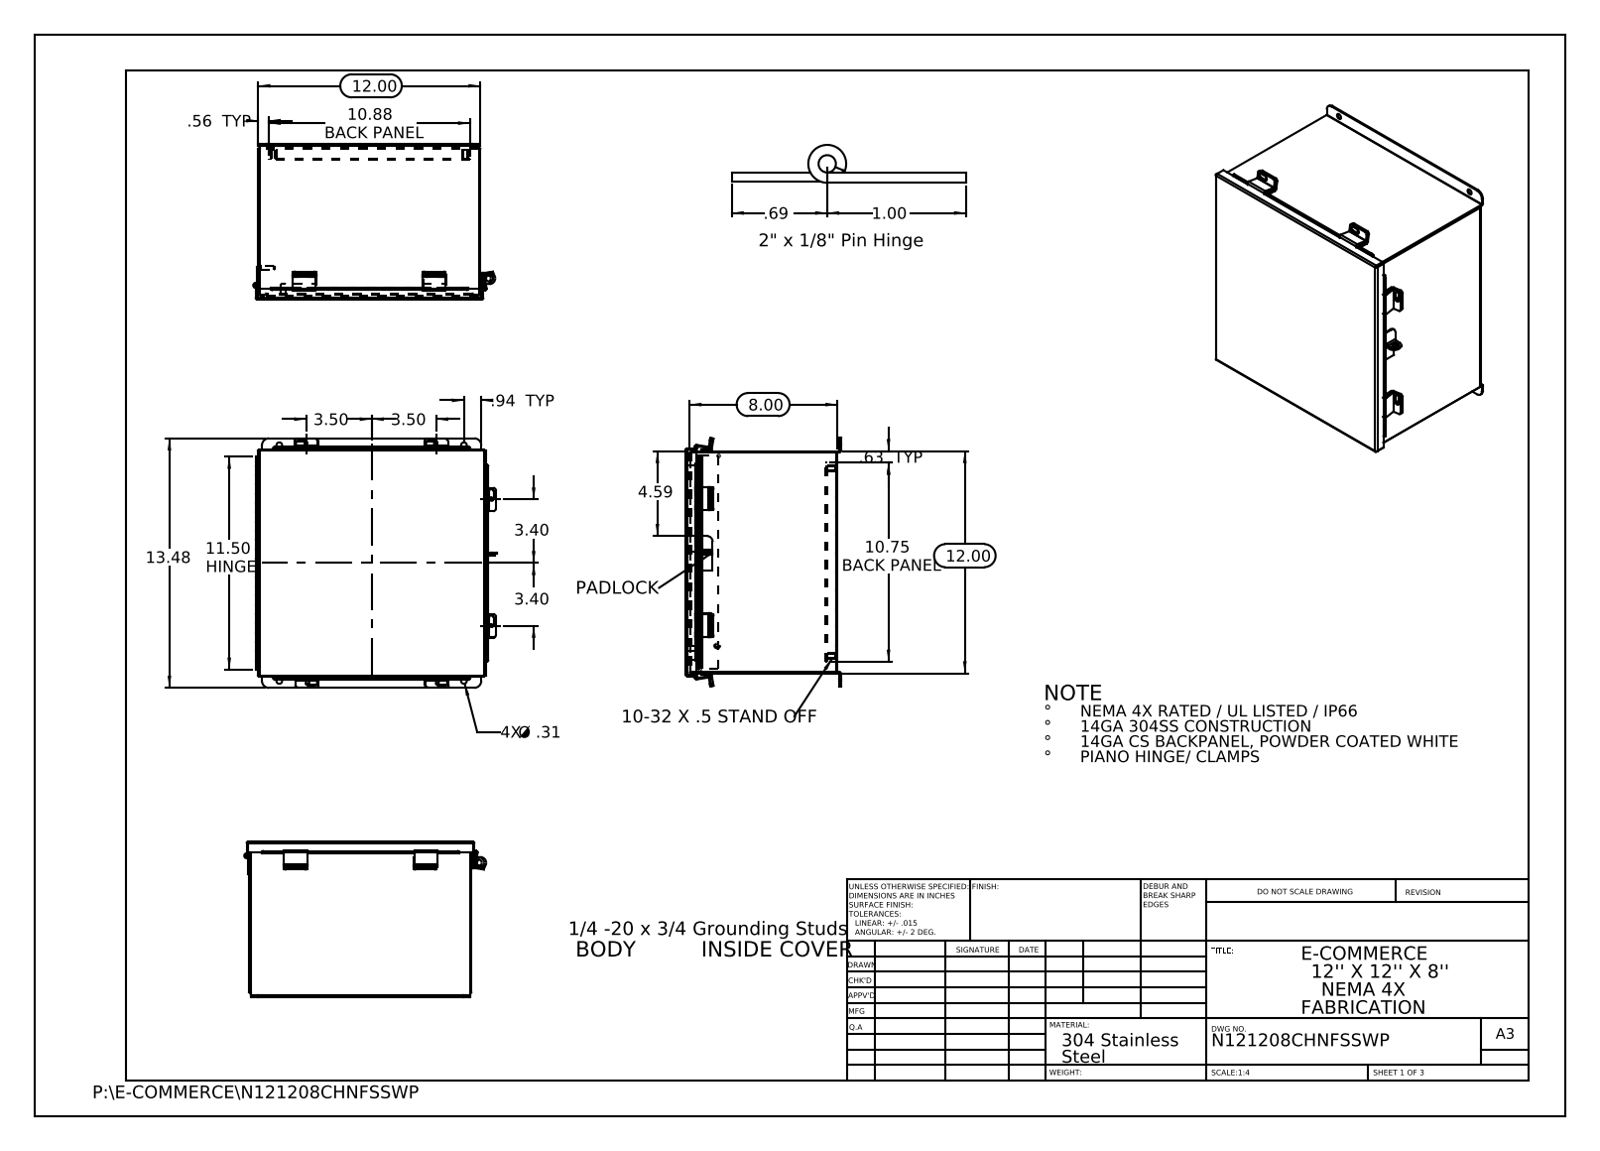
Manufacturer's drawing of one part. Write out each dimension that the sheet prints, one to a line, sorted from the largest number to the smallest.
13.48
12.00
12.00
11.50 HINGE
10.88 BACK PANEL
10.75 BACK PANEL
8.00
4.59
3.50
3.50
3.40
3.40
1.00
.94 TYP
.69
.63 TYP
.56 TYP
4X Ø .31
